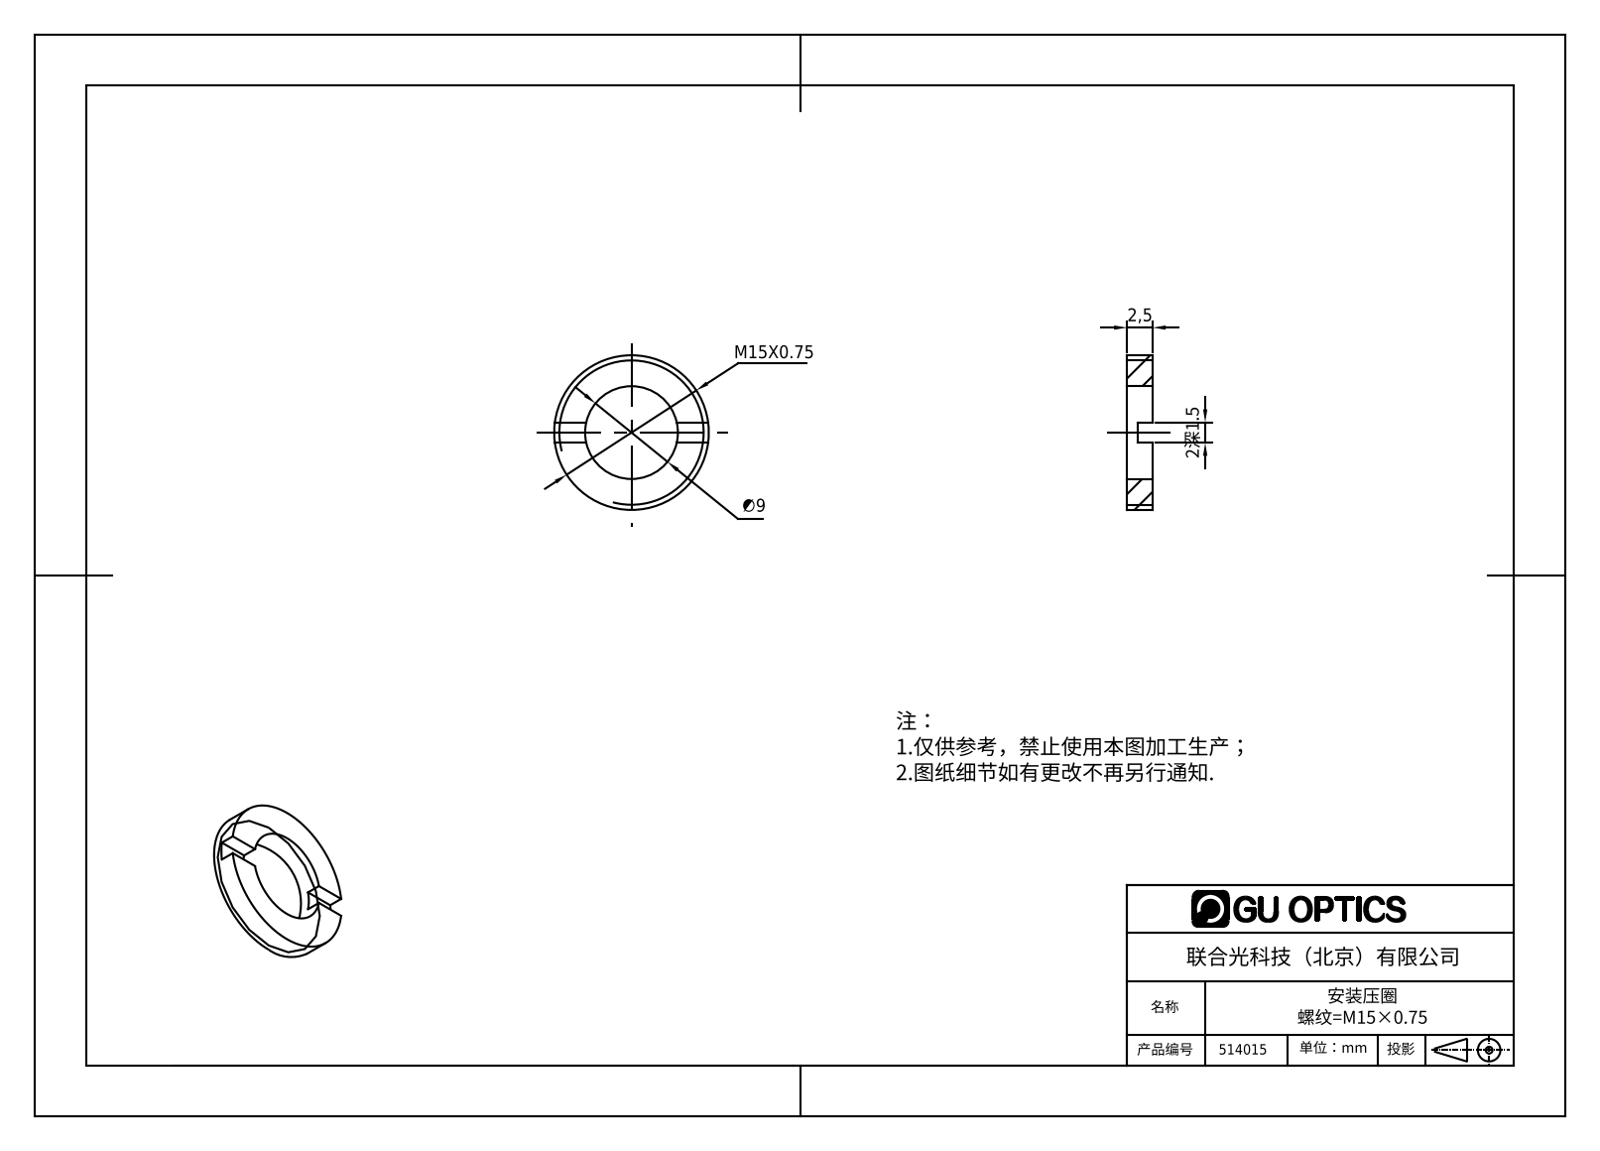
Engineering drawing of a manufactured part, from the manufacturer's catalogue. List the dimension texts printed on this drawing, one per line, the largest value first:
M15X0.75
∅9
2,5
2深1.5
